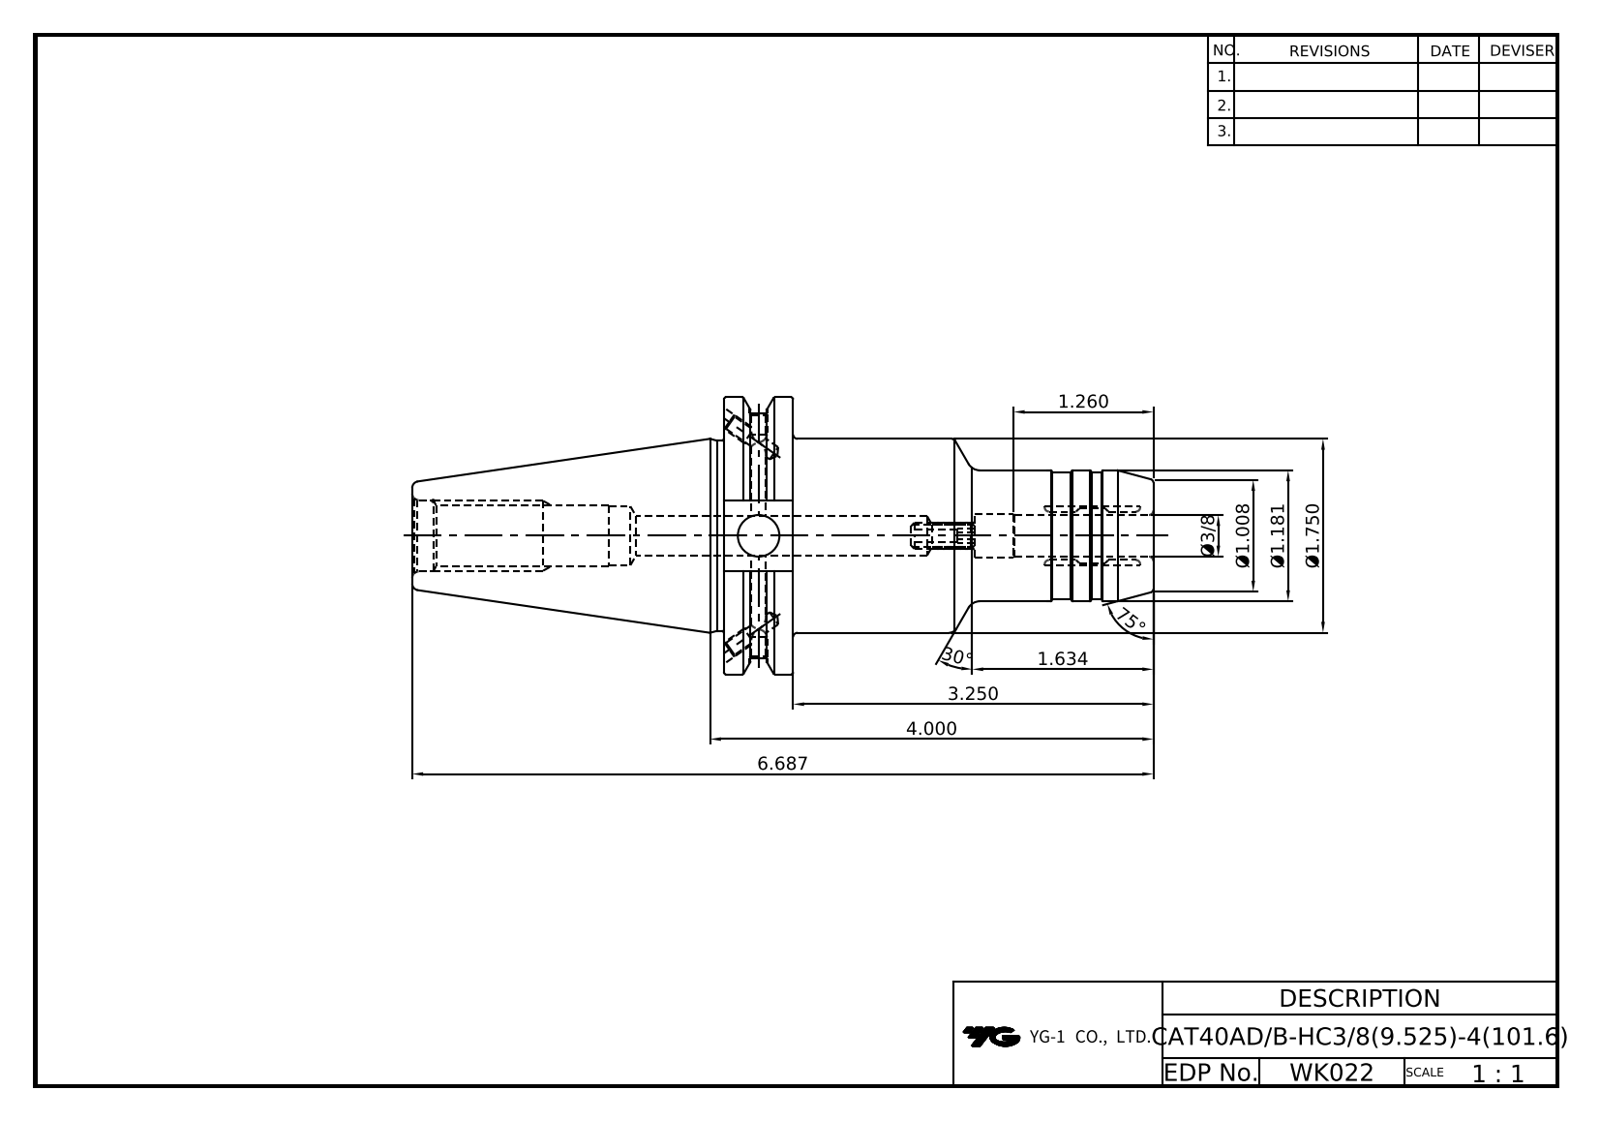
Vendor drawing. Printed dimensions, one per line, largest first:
75°
30°
6.687
4.000
3.250
Ø1.750
1.634
1.260
Ø1.181
Ø1.008
Ø3/8
